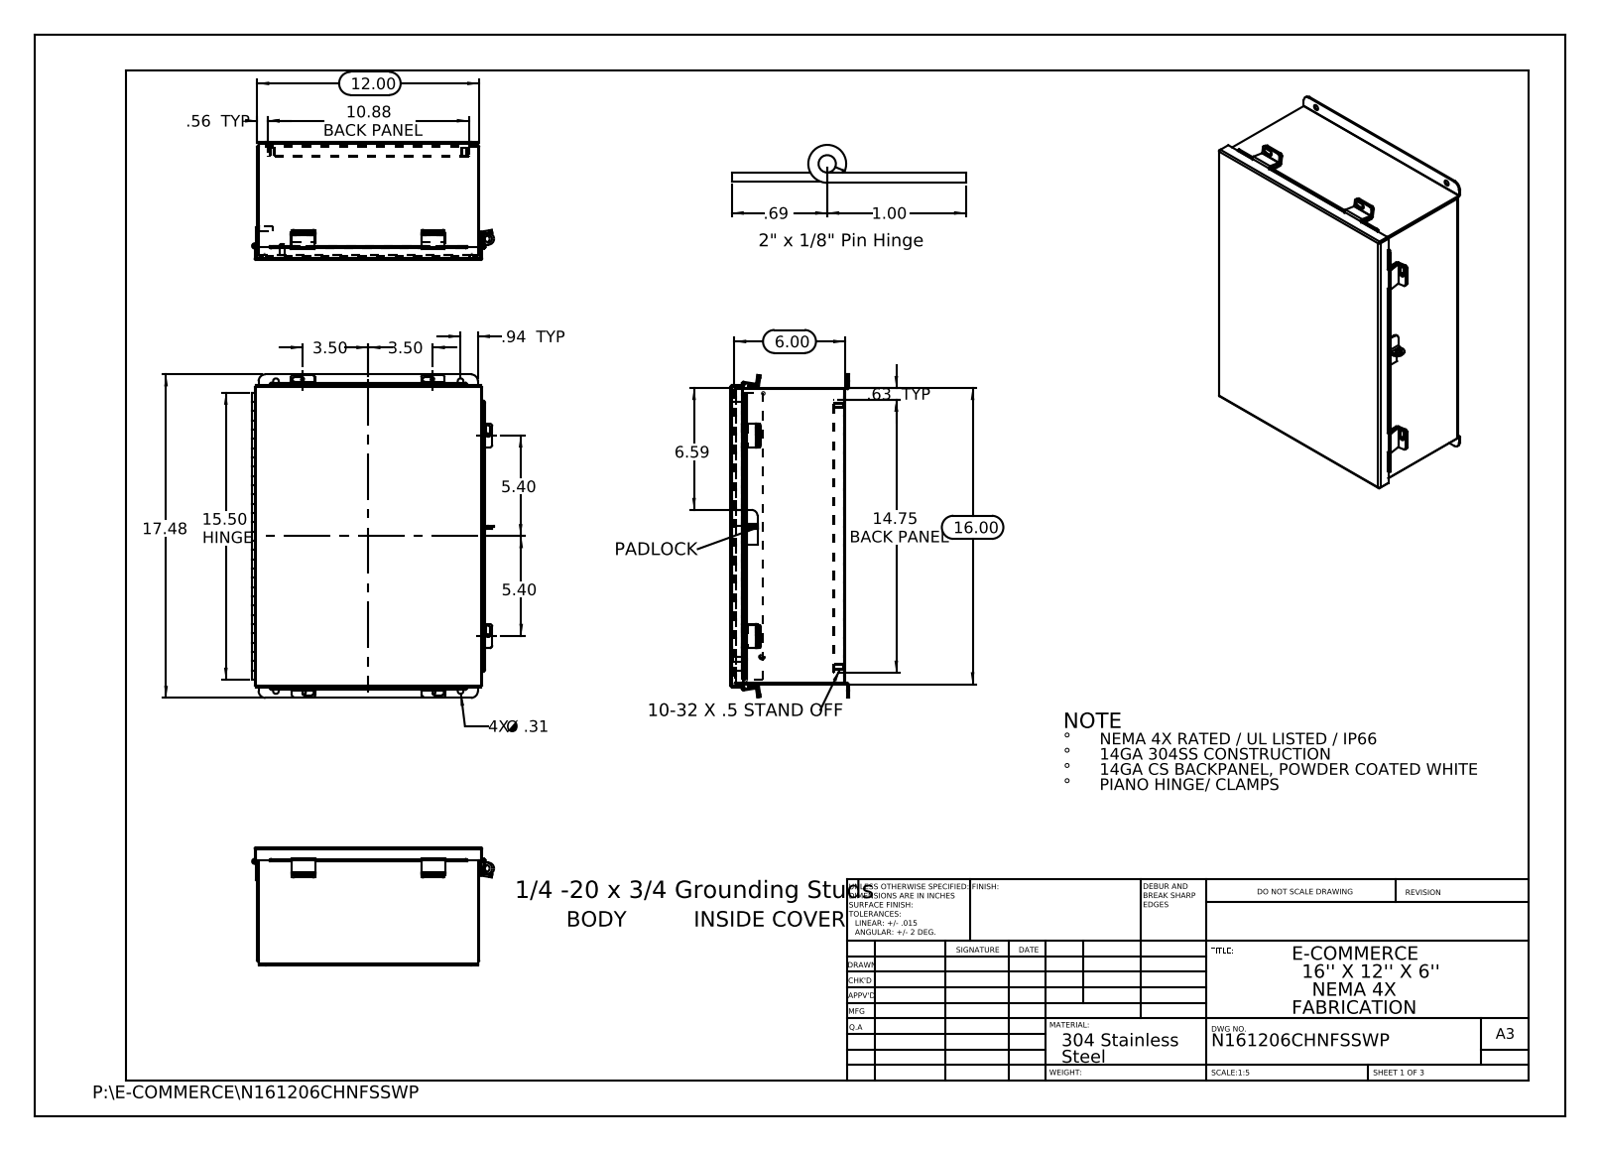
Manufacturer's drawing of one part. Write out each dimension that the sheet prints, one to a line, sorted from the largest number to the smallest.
17.48
16.00
15.50 HINGE
14.75 BACK PANEL
12.00
10.88 BACK PANEL
6.59
6.00
5.40
5.40
3.50
3.50
1.00
.94 TYP
.69
.63 TYP
.56 TYP
4X Ø .31
